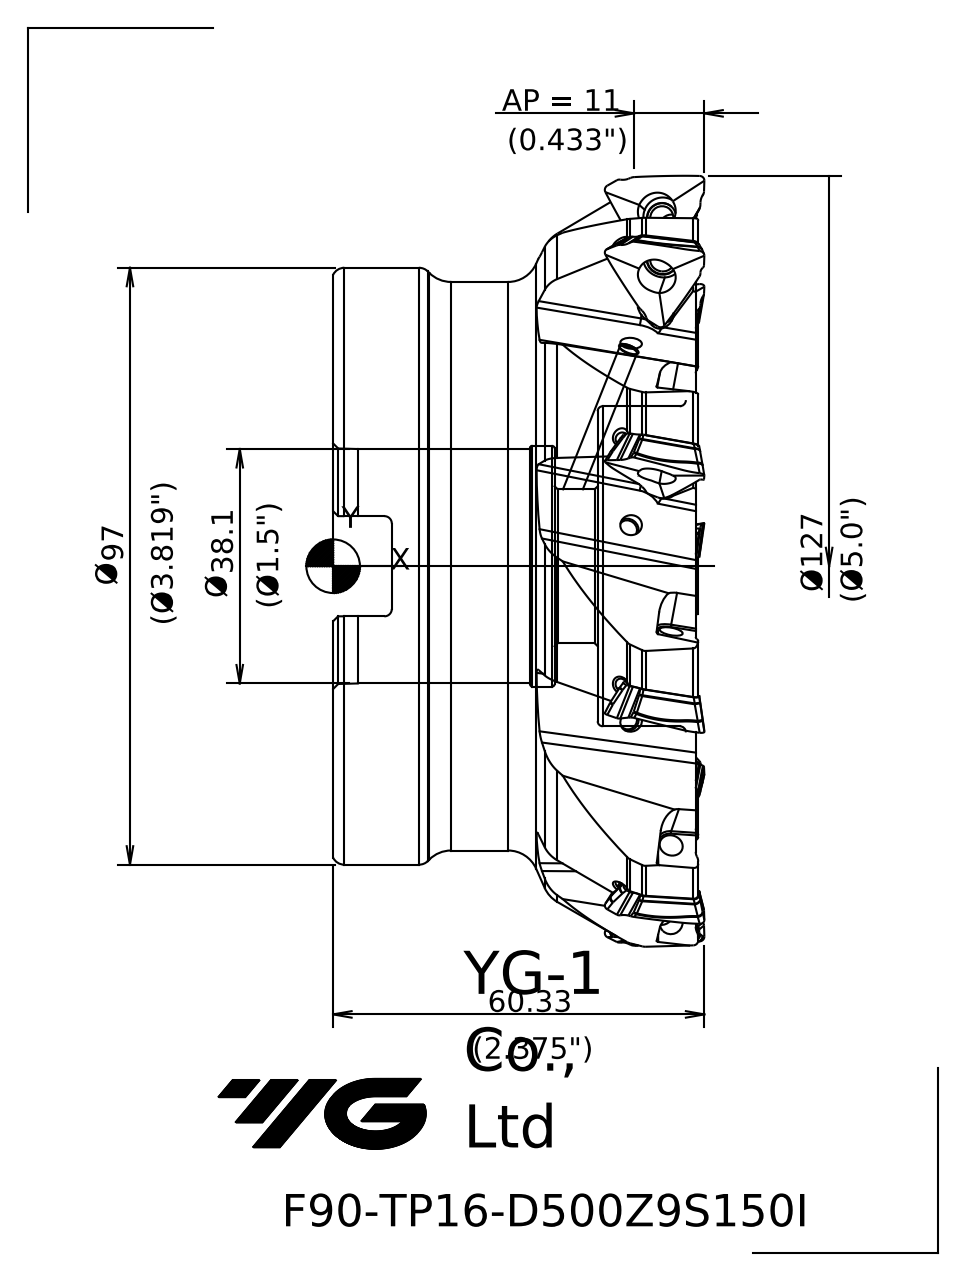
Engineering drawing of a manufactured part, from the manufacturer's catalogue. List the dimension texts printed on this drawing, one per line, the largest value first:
60.33
38.1 Ø
AP = 11
